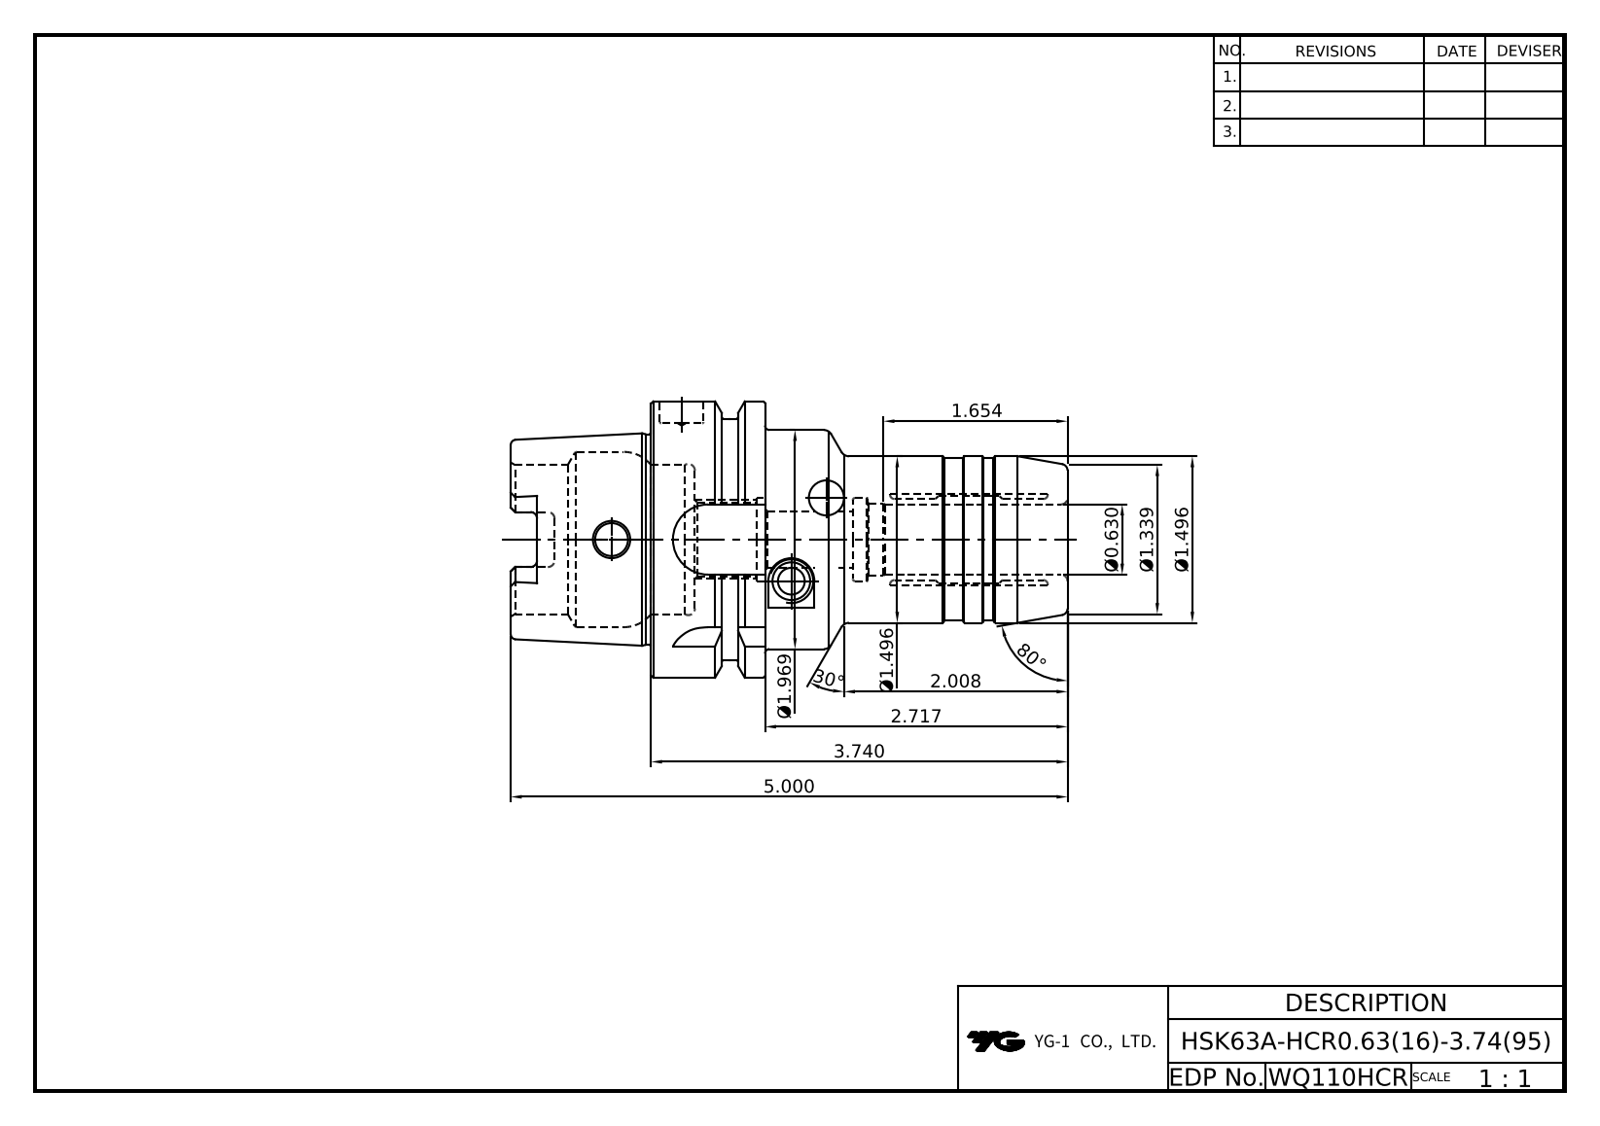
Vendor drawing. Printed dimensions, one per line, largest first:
80°
30°
5.000
3.740
2.717
2.008
Ø1.969
1.654
Ø1.496
Ø1.496
Ø1.339
Ø0.630
